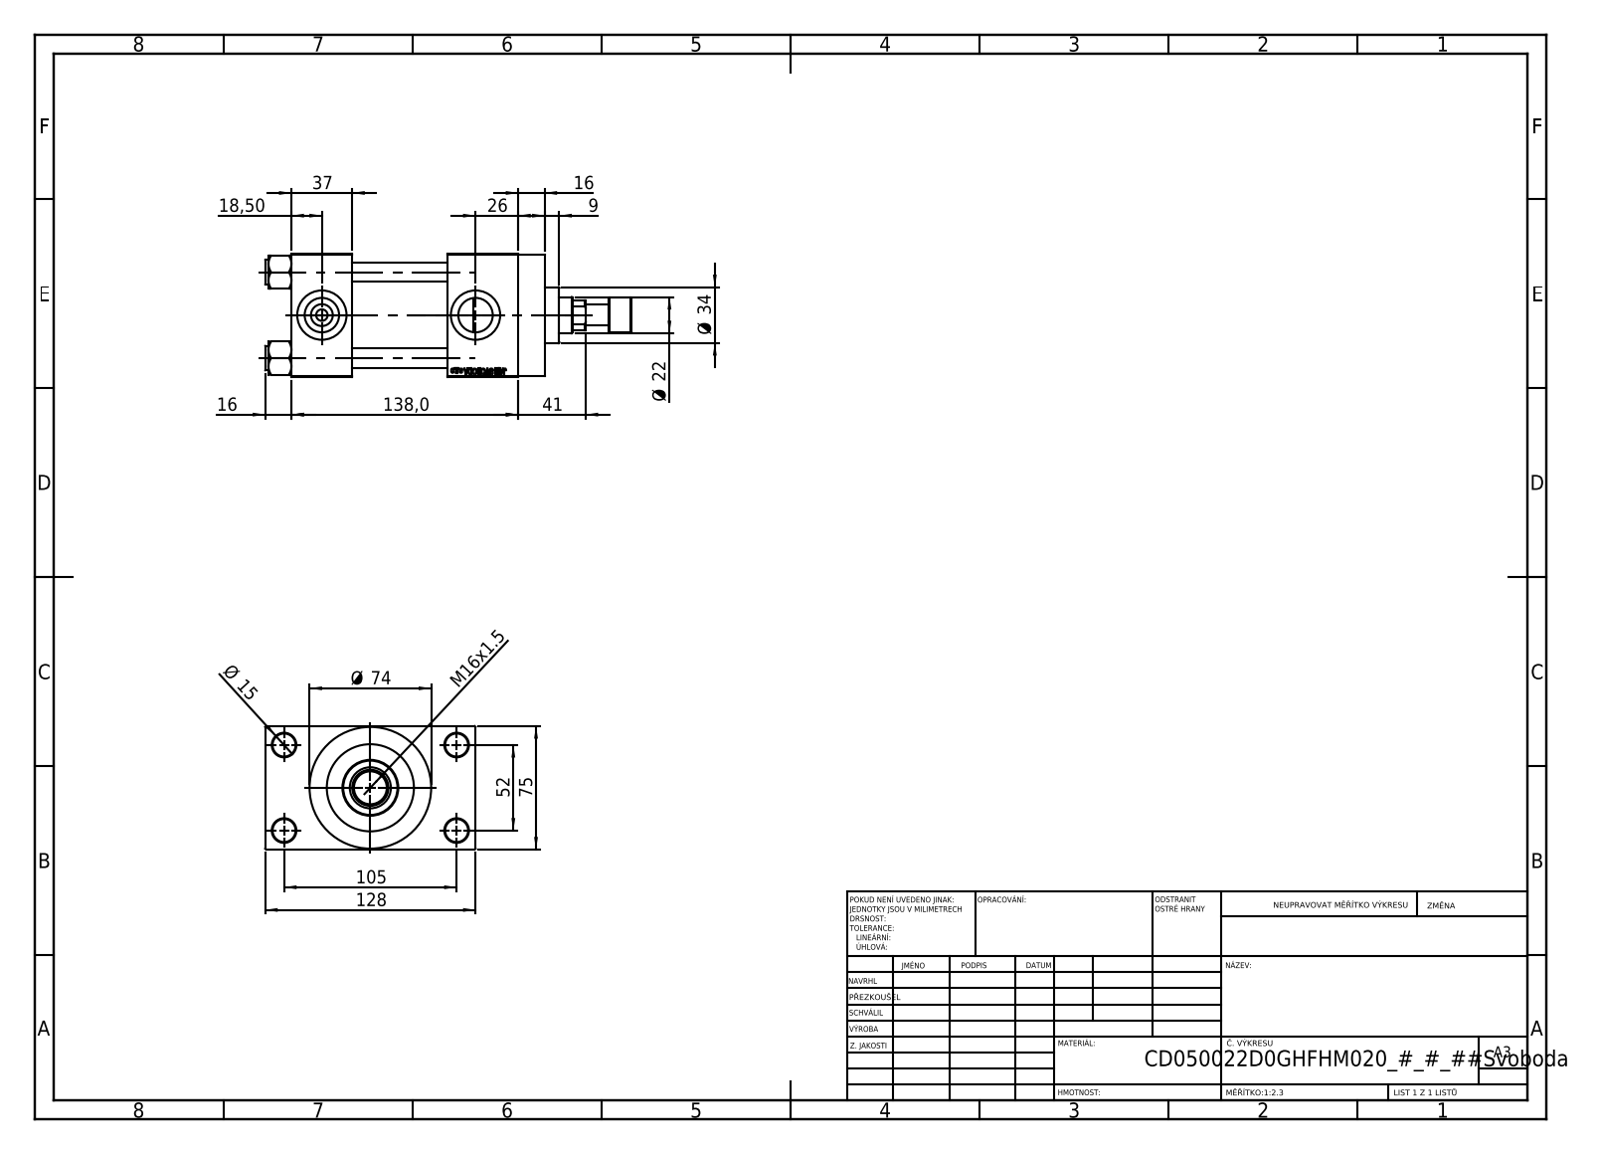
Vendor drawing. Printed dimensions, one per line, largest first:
138,0
128
105
75
Ø 74
52
41
37
Ø 34
26
Ø 22
18,50
16
16
M16x1.5
Ø 15
9
